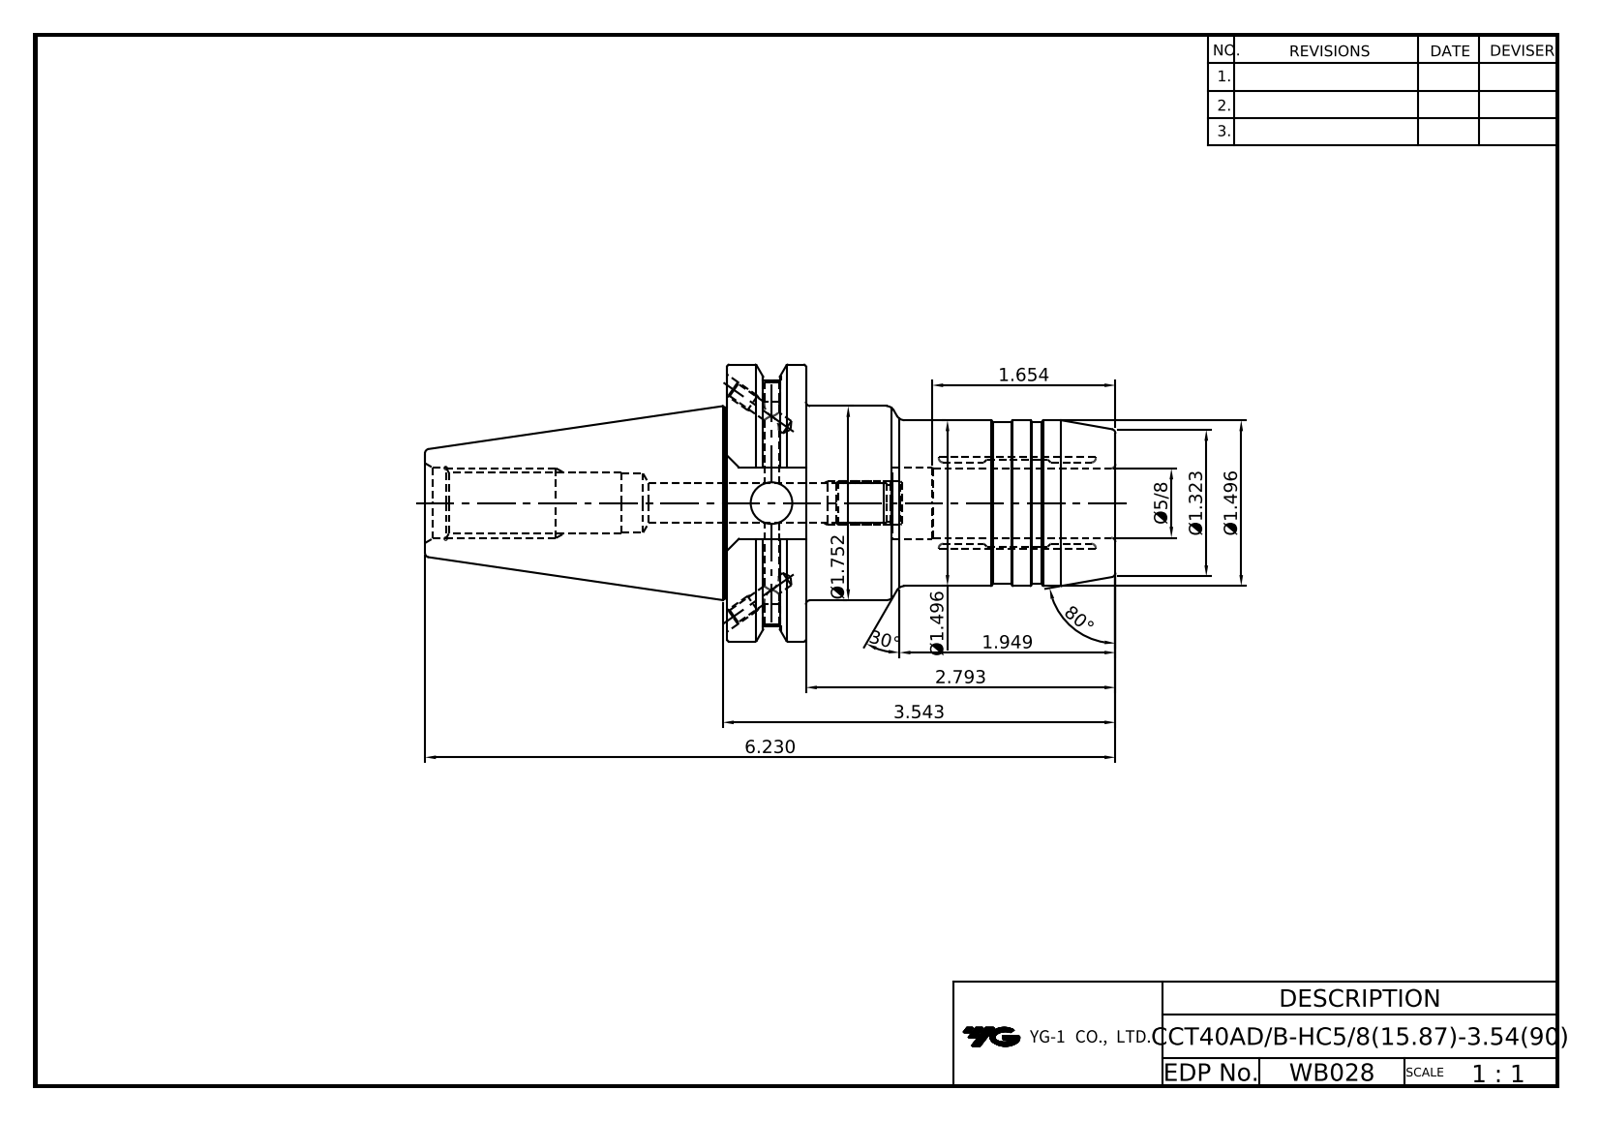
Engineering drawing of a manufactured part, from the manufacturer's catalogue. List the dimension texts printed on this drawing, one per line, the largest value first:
80°
30°
6.230
3.543
2.793
1.949
Ø1.752
1.654
Ø1.496
Ø1.496
Ø1.323
Ø5/8
